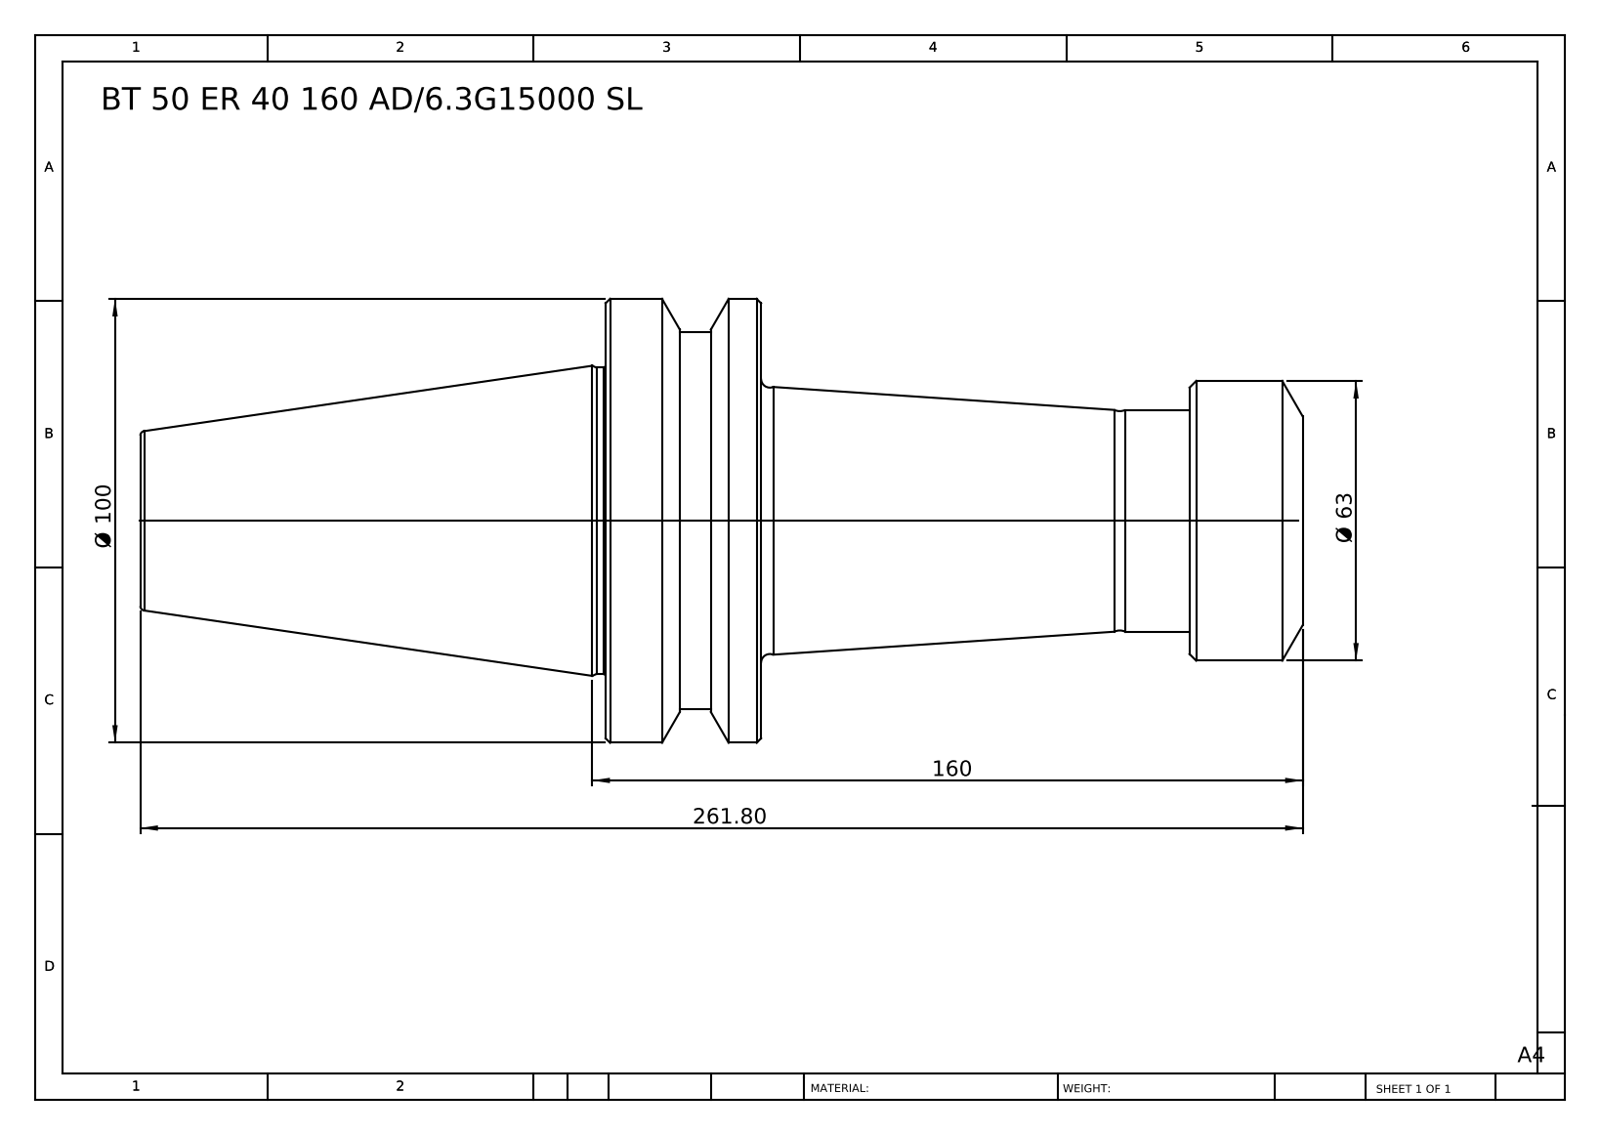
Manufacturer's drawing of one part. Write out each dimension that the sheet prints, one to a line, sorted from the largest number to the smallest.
261.80
160
Ø 100
Ø 63
